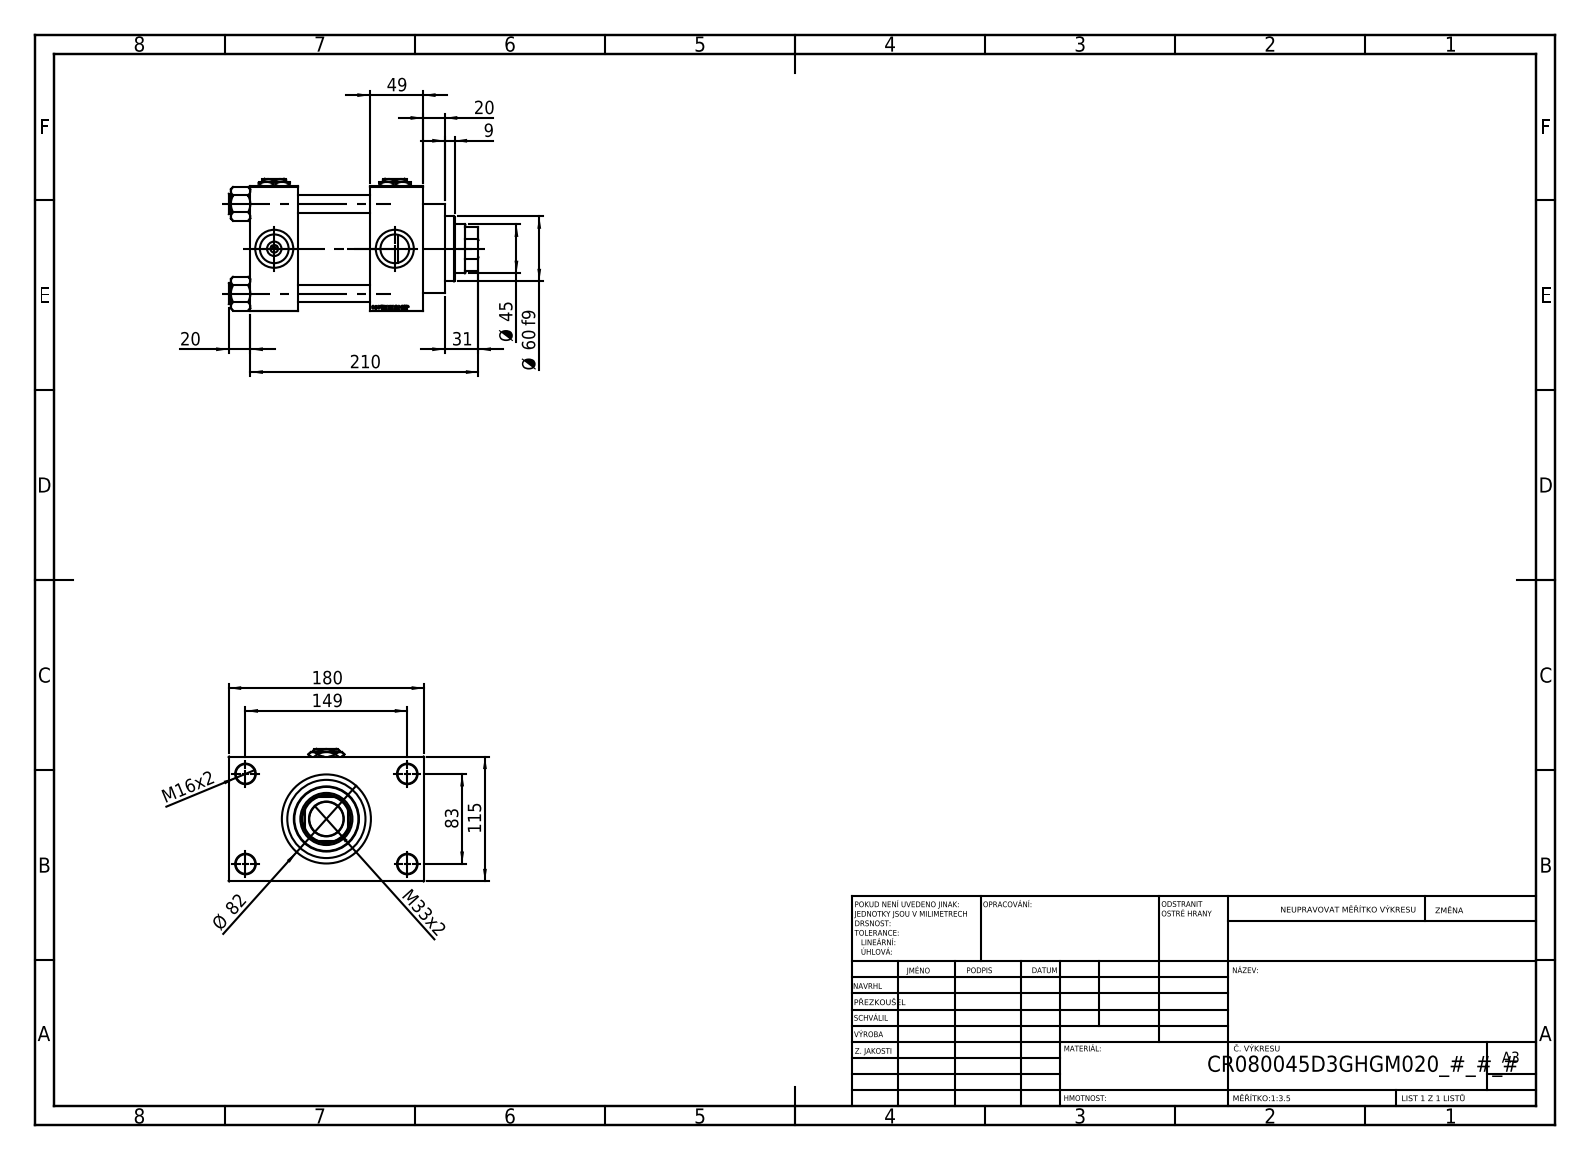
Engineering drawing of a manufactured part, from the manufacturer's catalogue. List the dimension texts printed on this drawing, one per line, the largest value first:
210
180
149
115
83
Ø 82
Ø 60 f9
49
Ø 45
M33x2
31
20
20
M16x2
9
